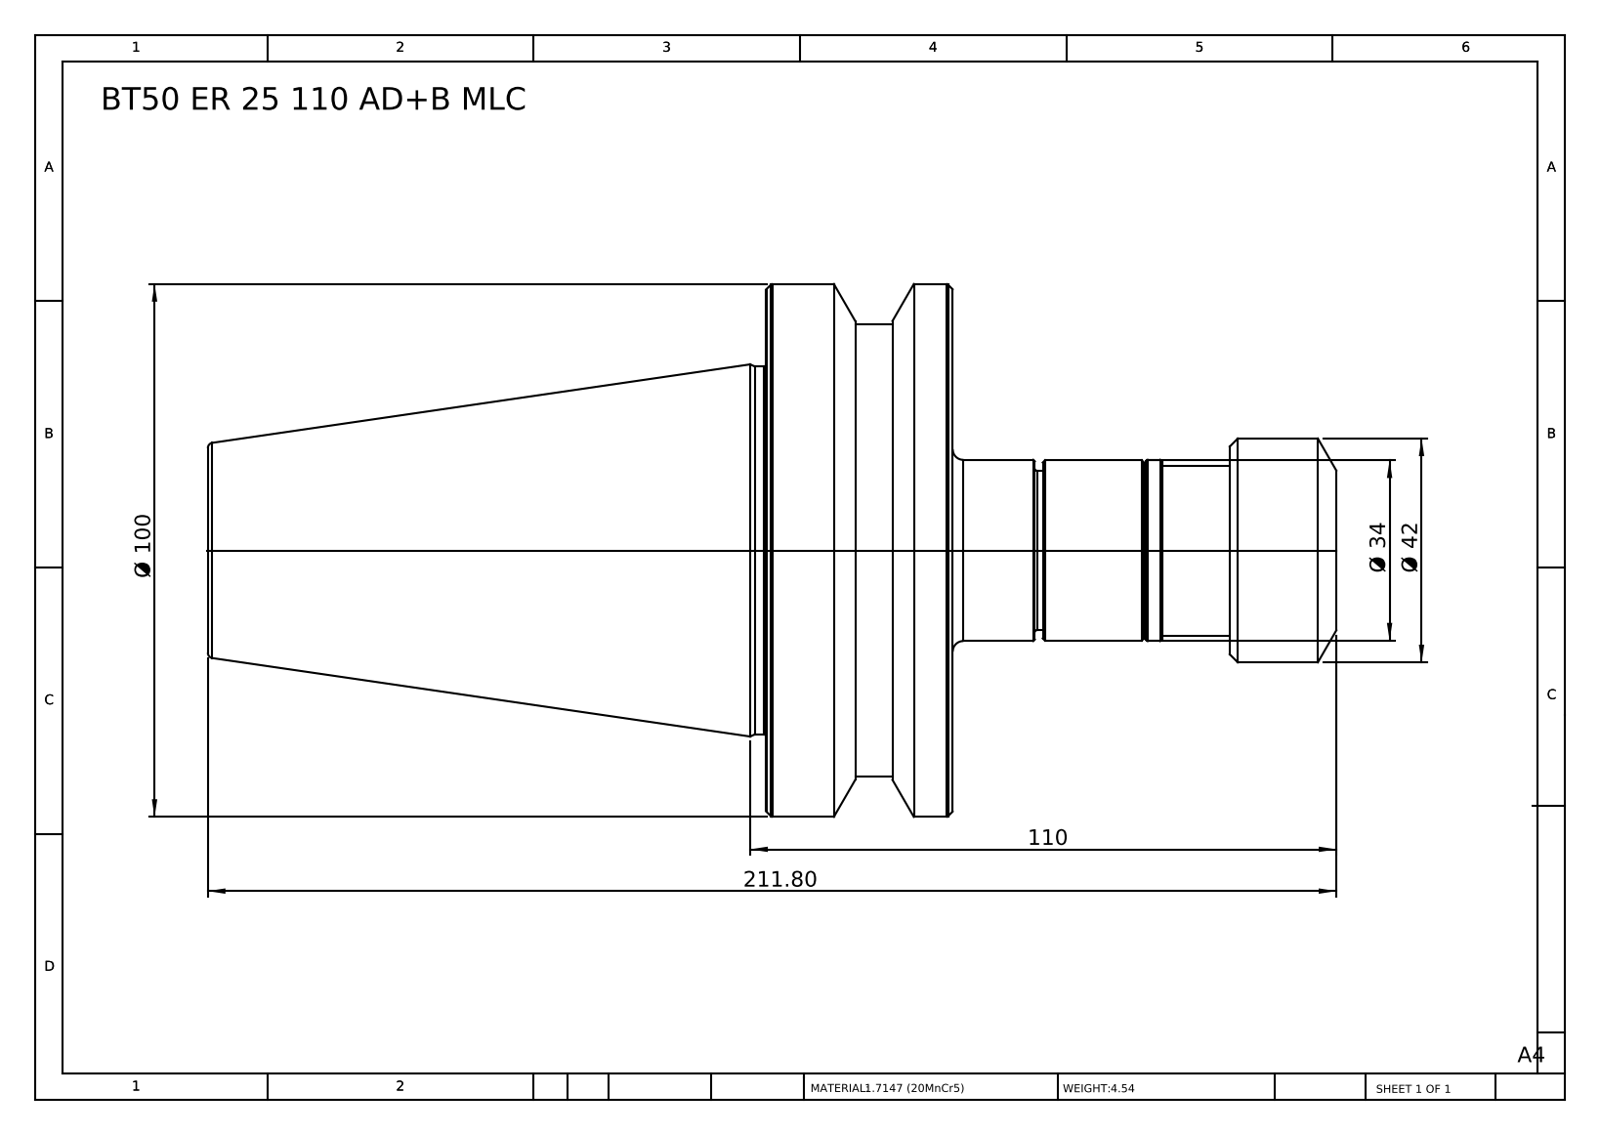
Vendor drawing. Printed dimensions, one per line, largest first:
211.80
110
Ø 100
Ø 42
Ø 34
